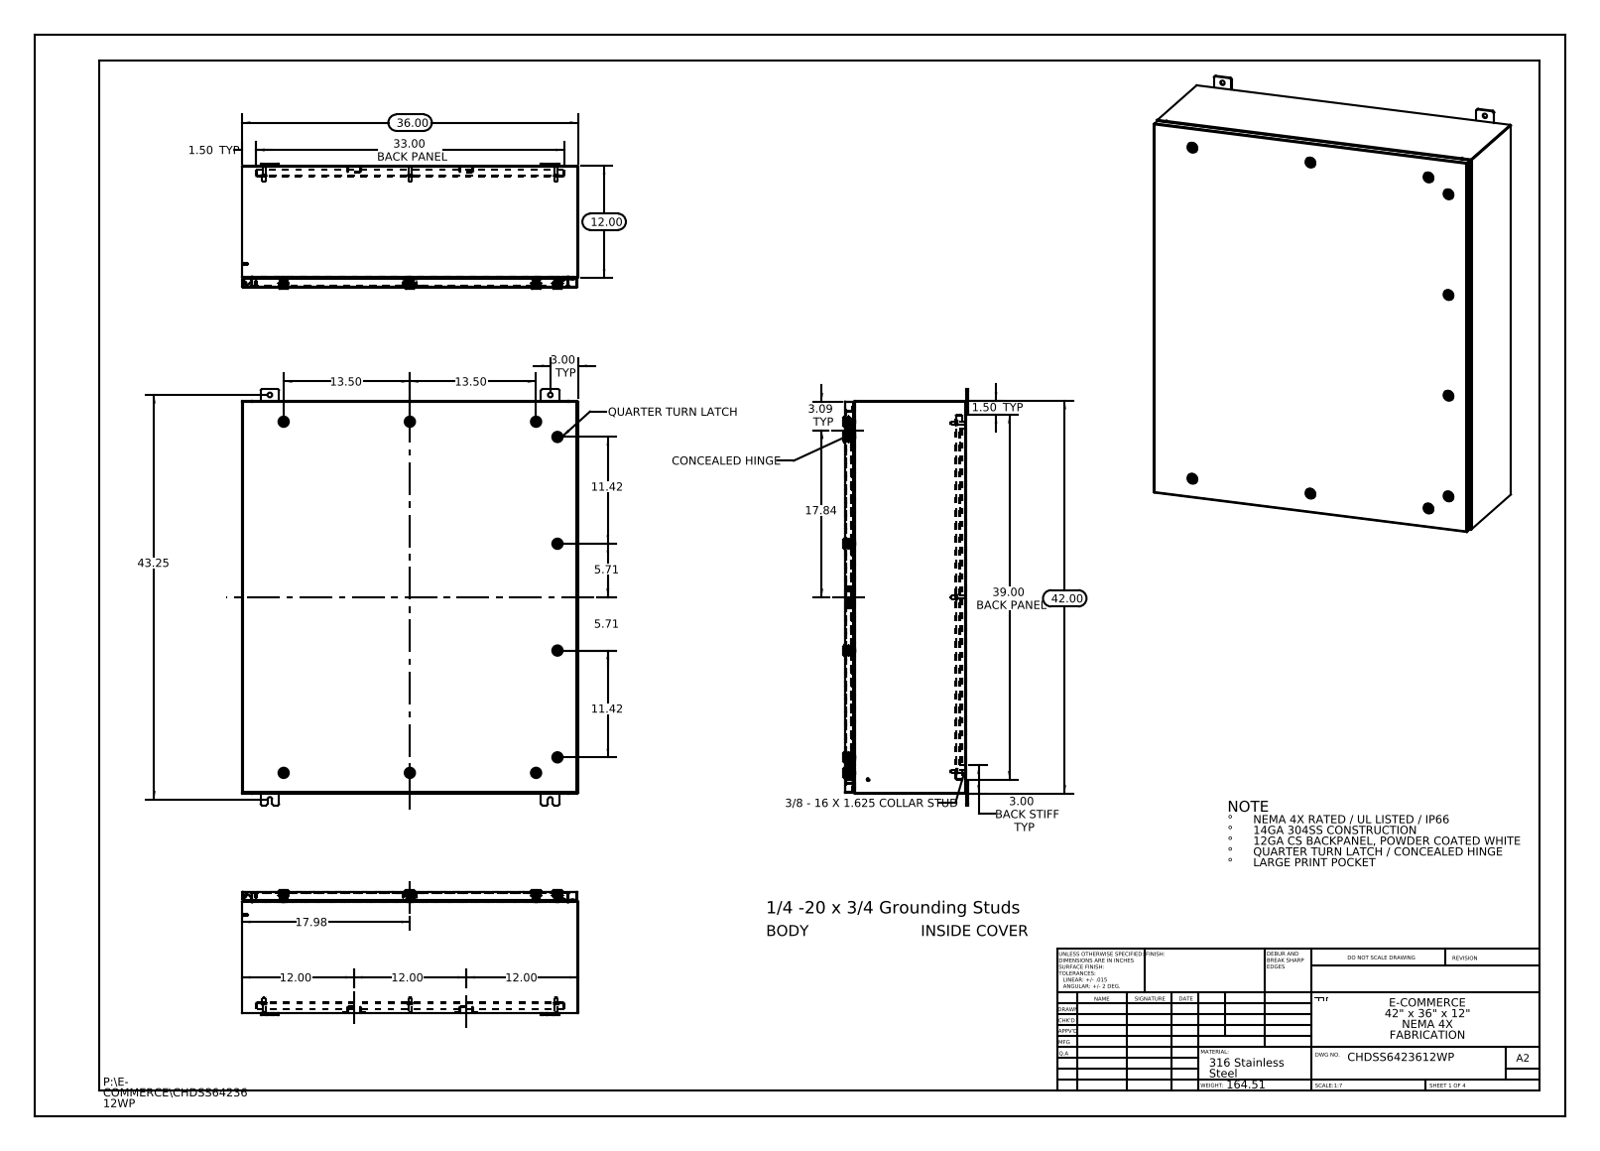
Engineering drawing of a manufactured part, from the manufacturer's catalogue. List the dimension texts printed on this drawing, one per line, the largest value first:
43.25
42.00
39.00 BACK PANEL
36.00
33.00 BACK PANEL
17.98
17.84
13.50
13.50
12.00
12.00
12.00
12.00
11.42
11.42
5.71
5.71
3.09 TYP
3.00 TYP
3.00 BACK STIFF TYP
1.50 TYP
1.50 TYP
